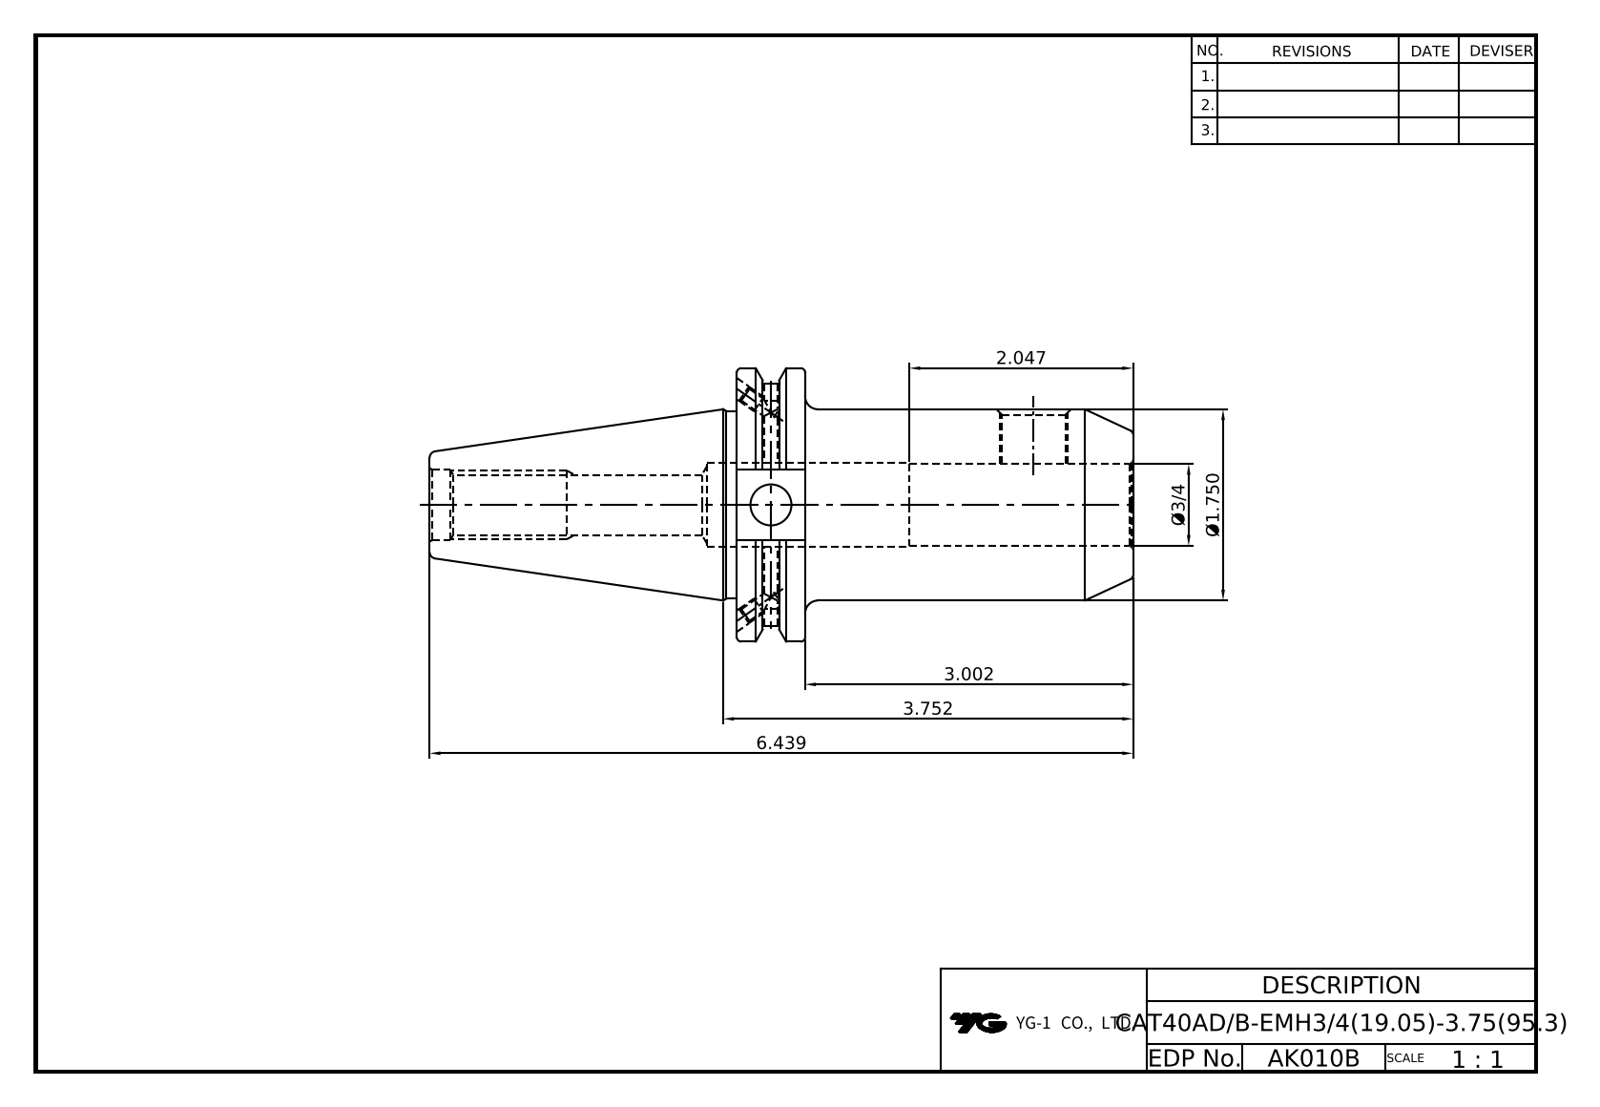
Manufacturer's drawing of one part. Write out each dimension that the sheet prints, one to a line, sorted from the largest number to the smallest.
6.439
3.752
3.002
2.047
Ø1.750
Ø3/4
